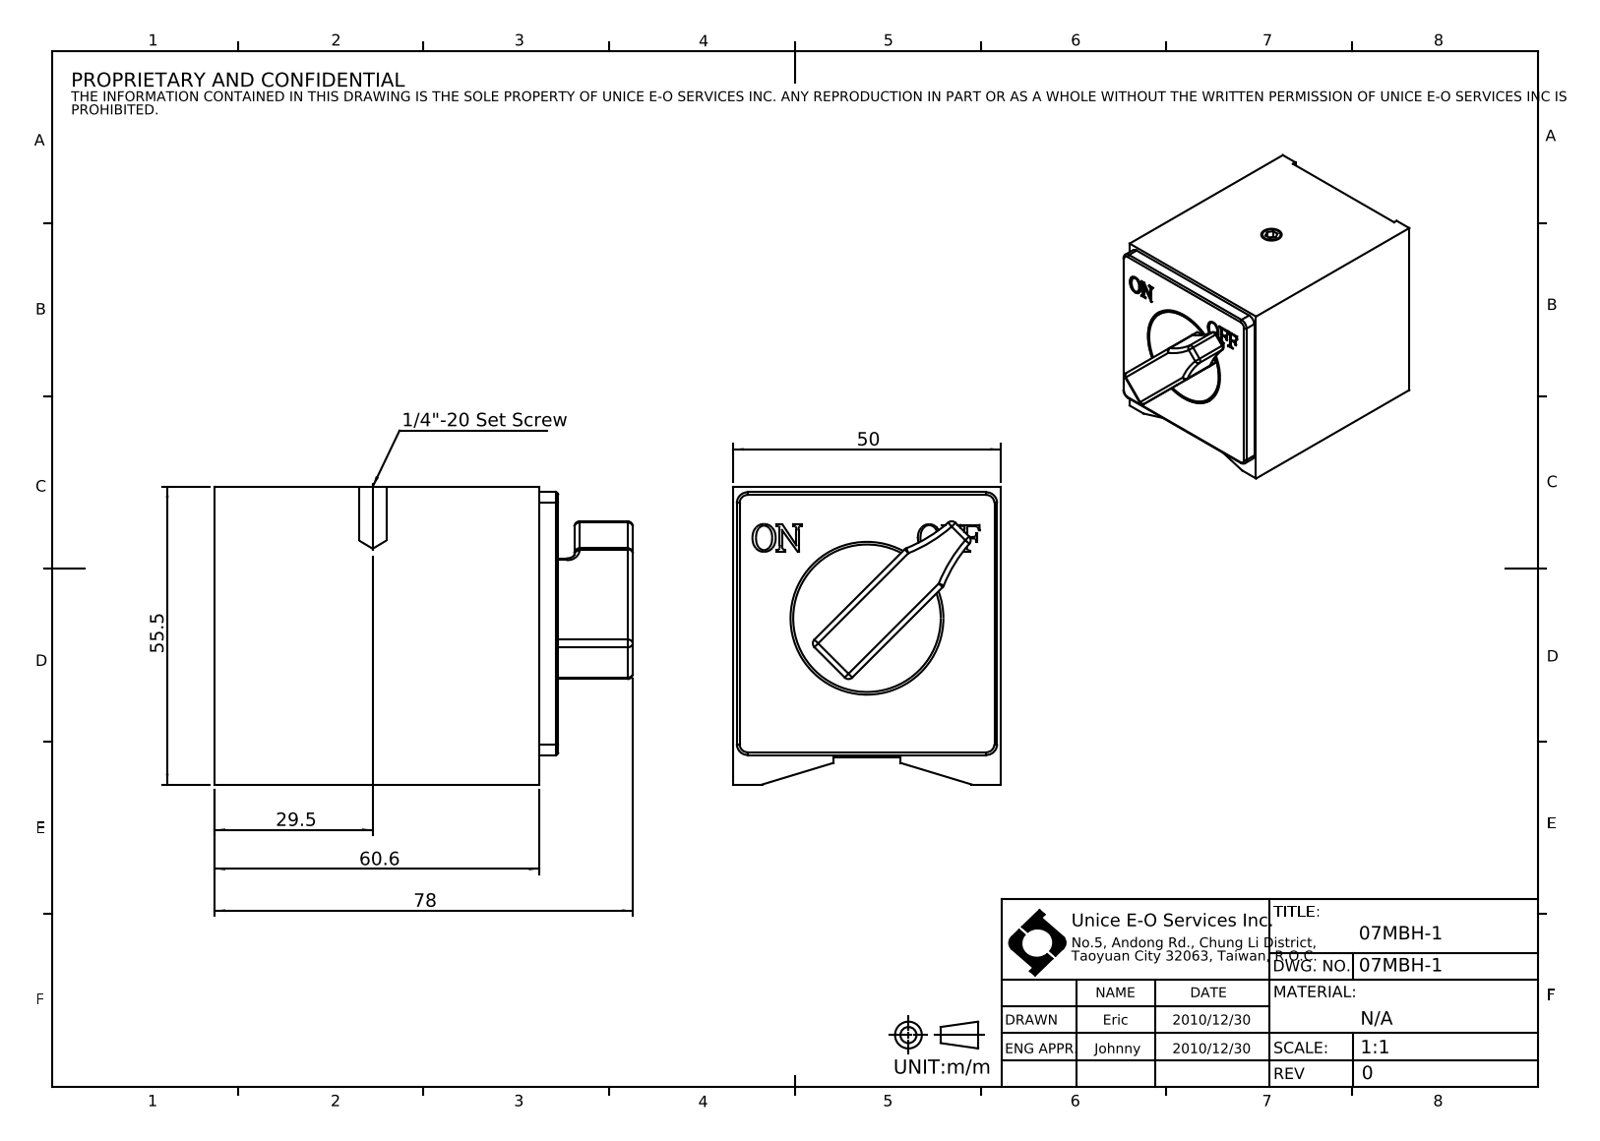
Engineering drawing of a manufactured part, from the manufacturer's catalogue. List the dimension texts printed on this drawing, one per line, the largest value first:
78
60.6
55.5
50
29.5
